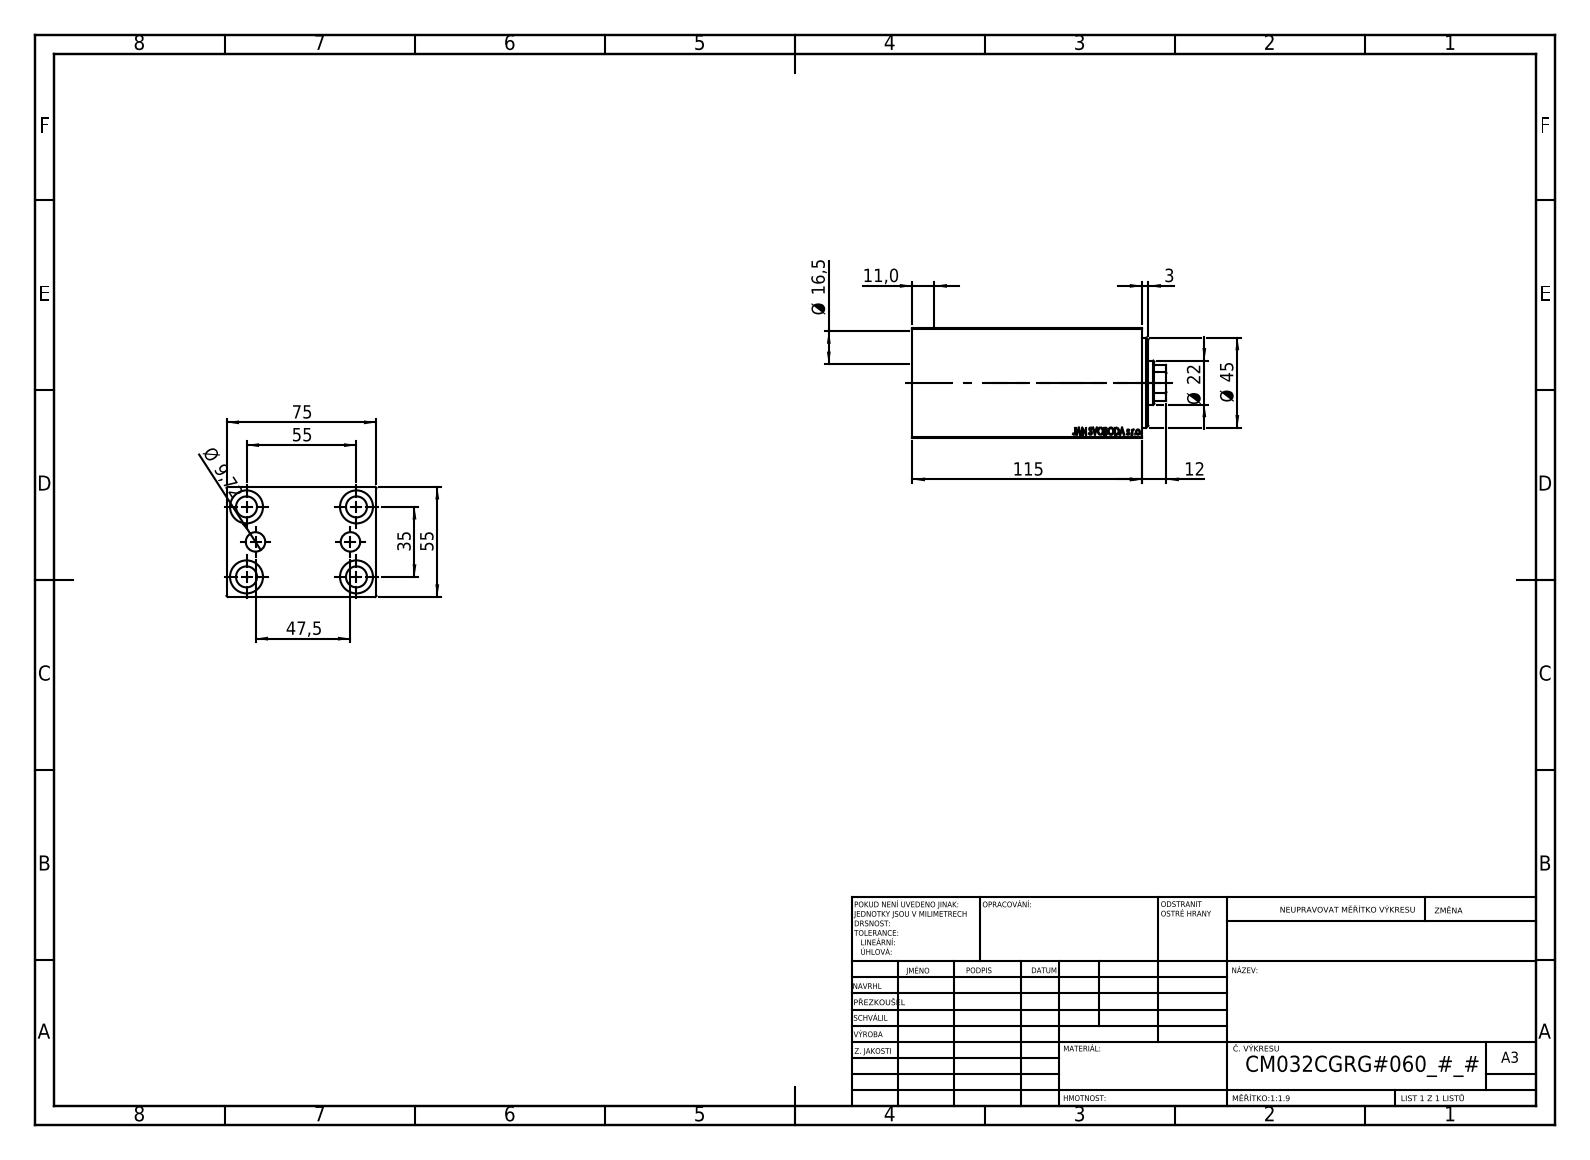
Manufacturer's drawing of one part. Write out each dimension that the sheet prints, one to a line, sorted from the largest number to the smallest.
115
75
55
55
47,5
Ø 45
35
Ø 22
Ø 16,5
12
11,0
Ø 9,72
3
